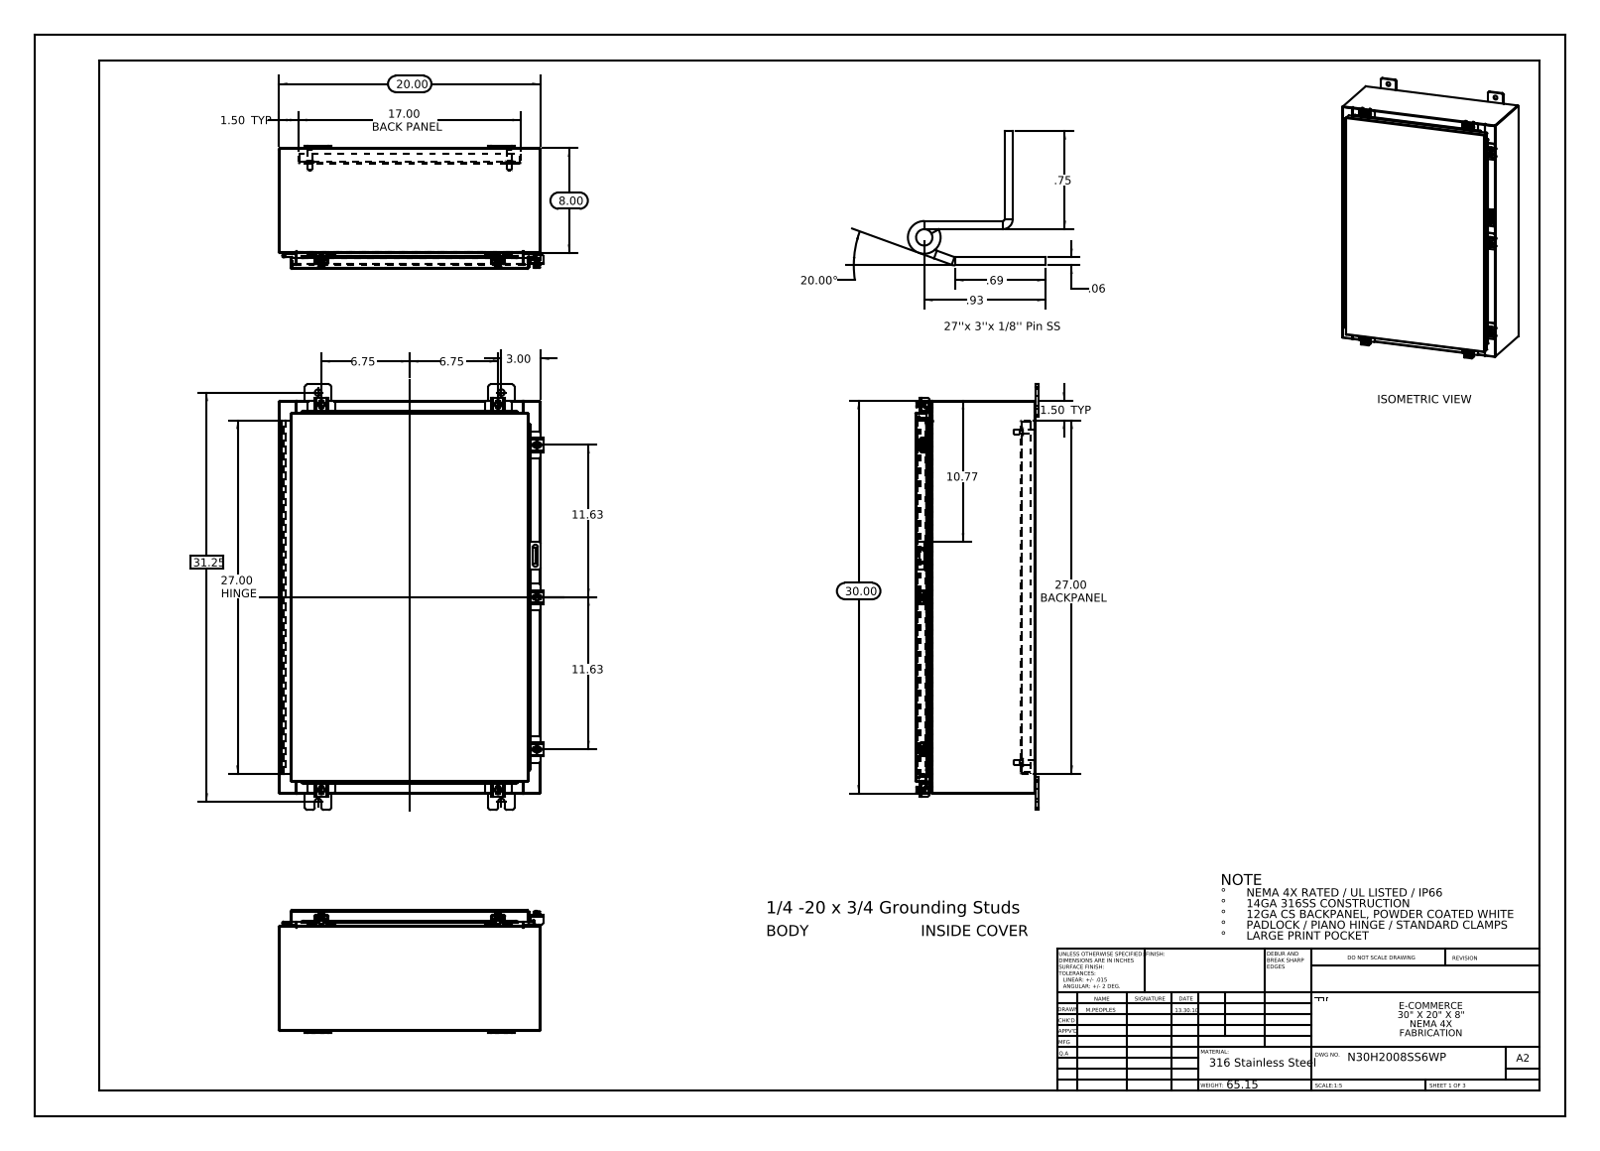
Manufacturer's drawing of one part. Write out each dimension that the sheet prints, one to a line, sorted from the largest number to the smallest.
31.25
30.00
27.00 HINGE
27.00 BACKPANEL
20.00
20.00°
17.00 BACK PANEL
11.63
11.63
10.77
8.00
6.75
6.75
3.00
1.50 TYP
1.50 TYP
.93
.75
.69
.06
